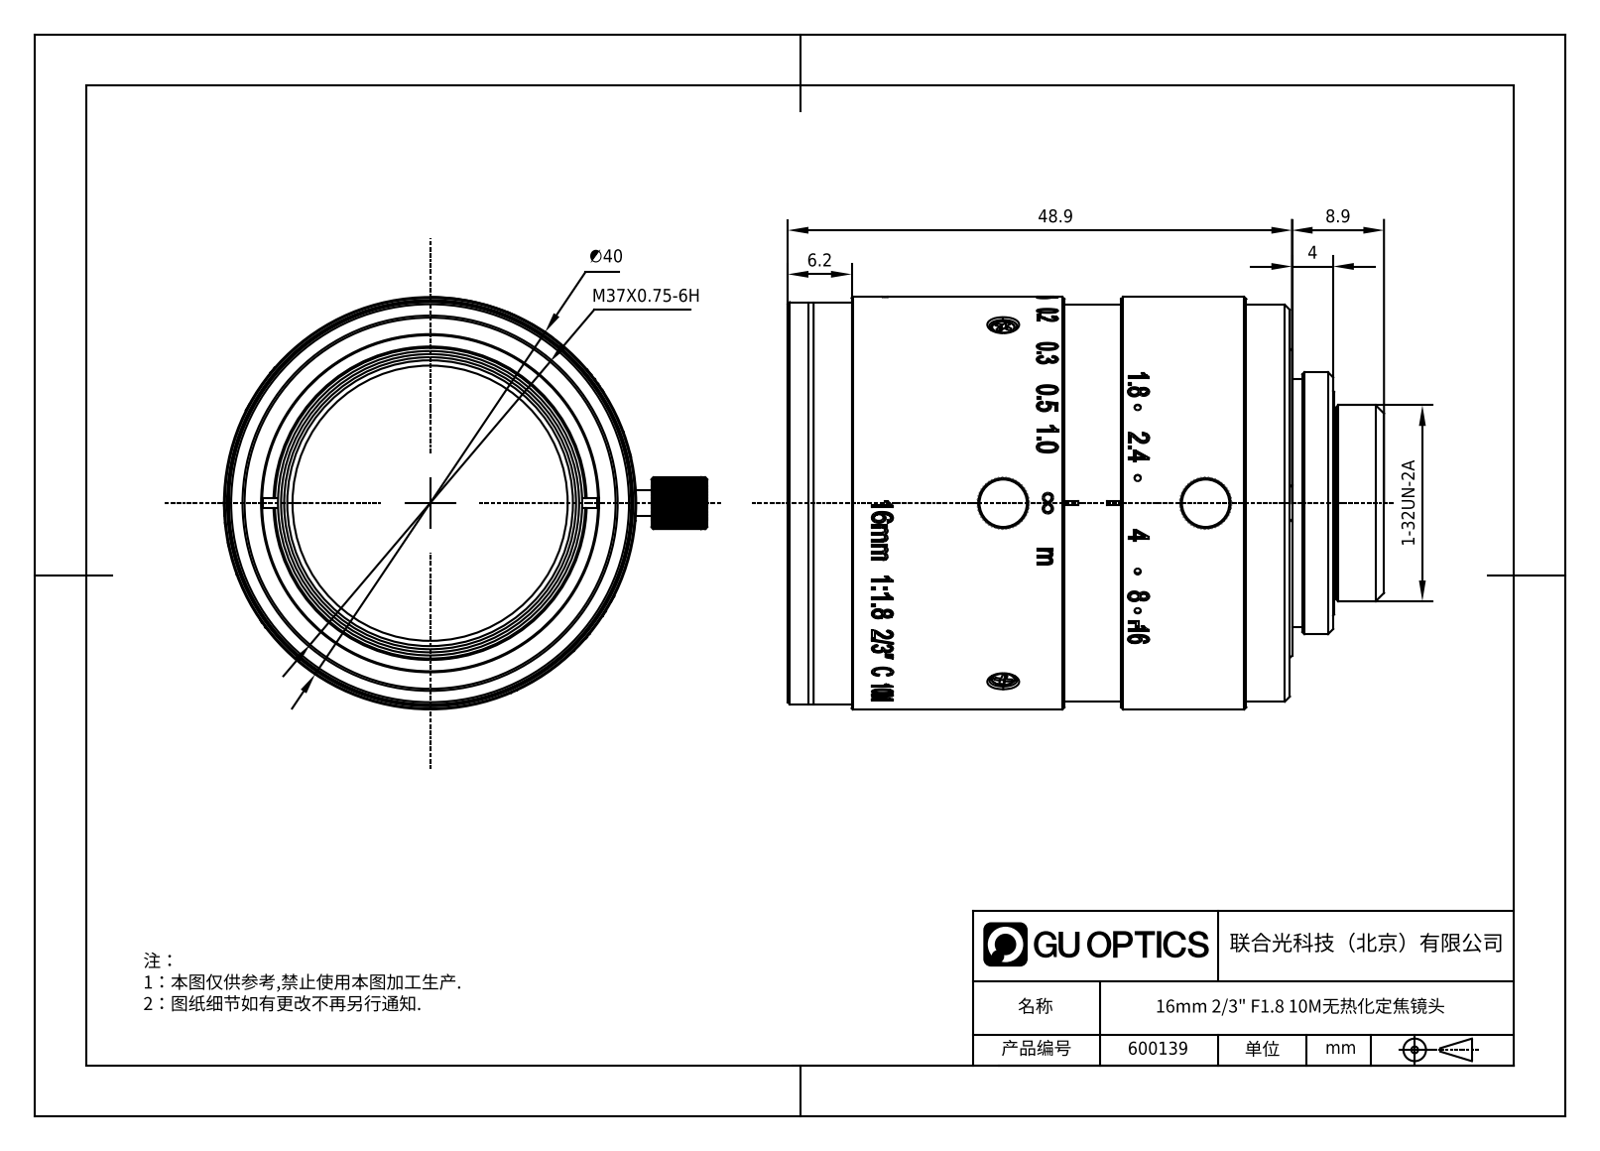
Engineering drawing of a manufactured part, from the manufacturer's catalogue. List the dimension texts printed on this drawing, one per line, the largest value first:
48.9
∅40
M37X0.75-6H
8.9
6.2
4
1-32UN-2A
